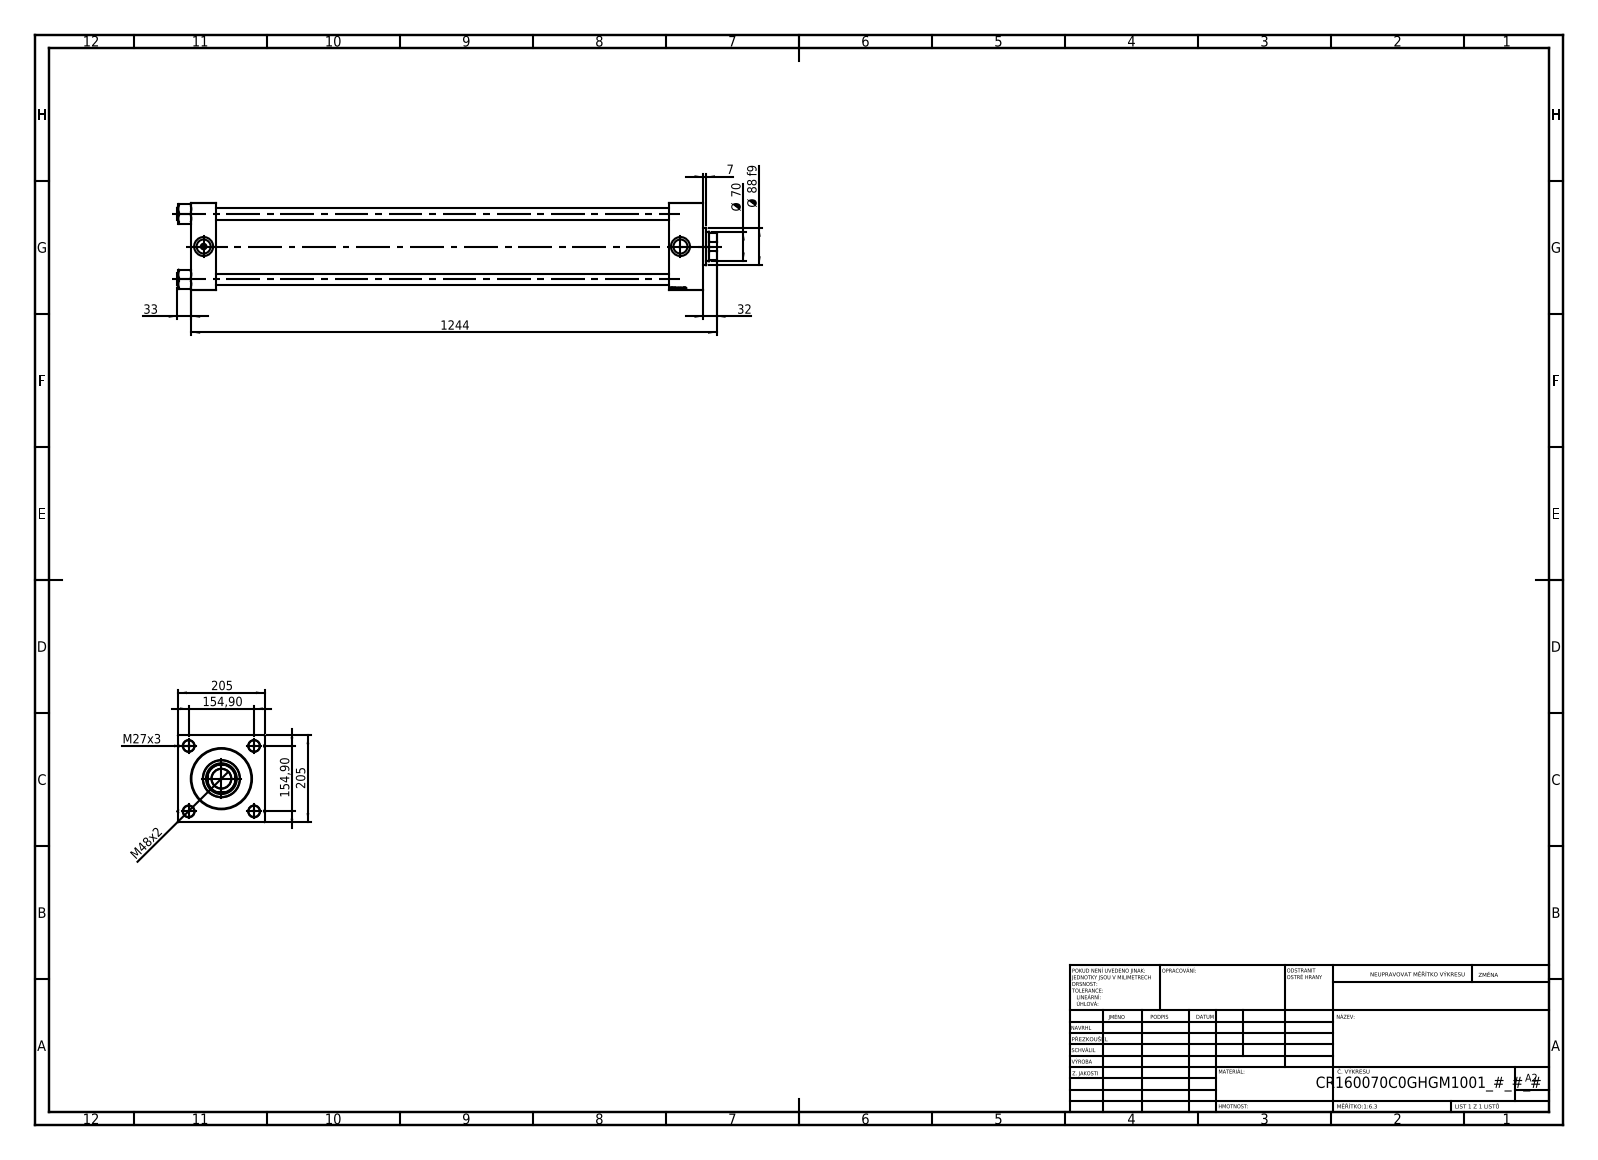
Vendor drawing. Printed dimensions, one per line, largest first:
1244
205
205
154,90
154,90
Ø 88 f9
Ø 70
M48x2
33
32
M27x3
7
